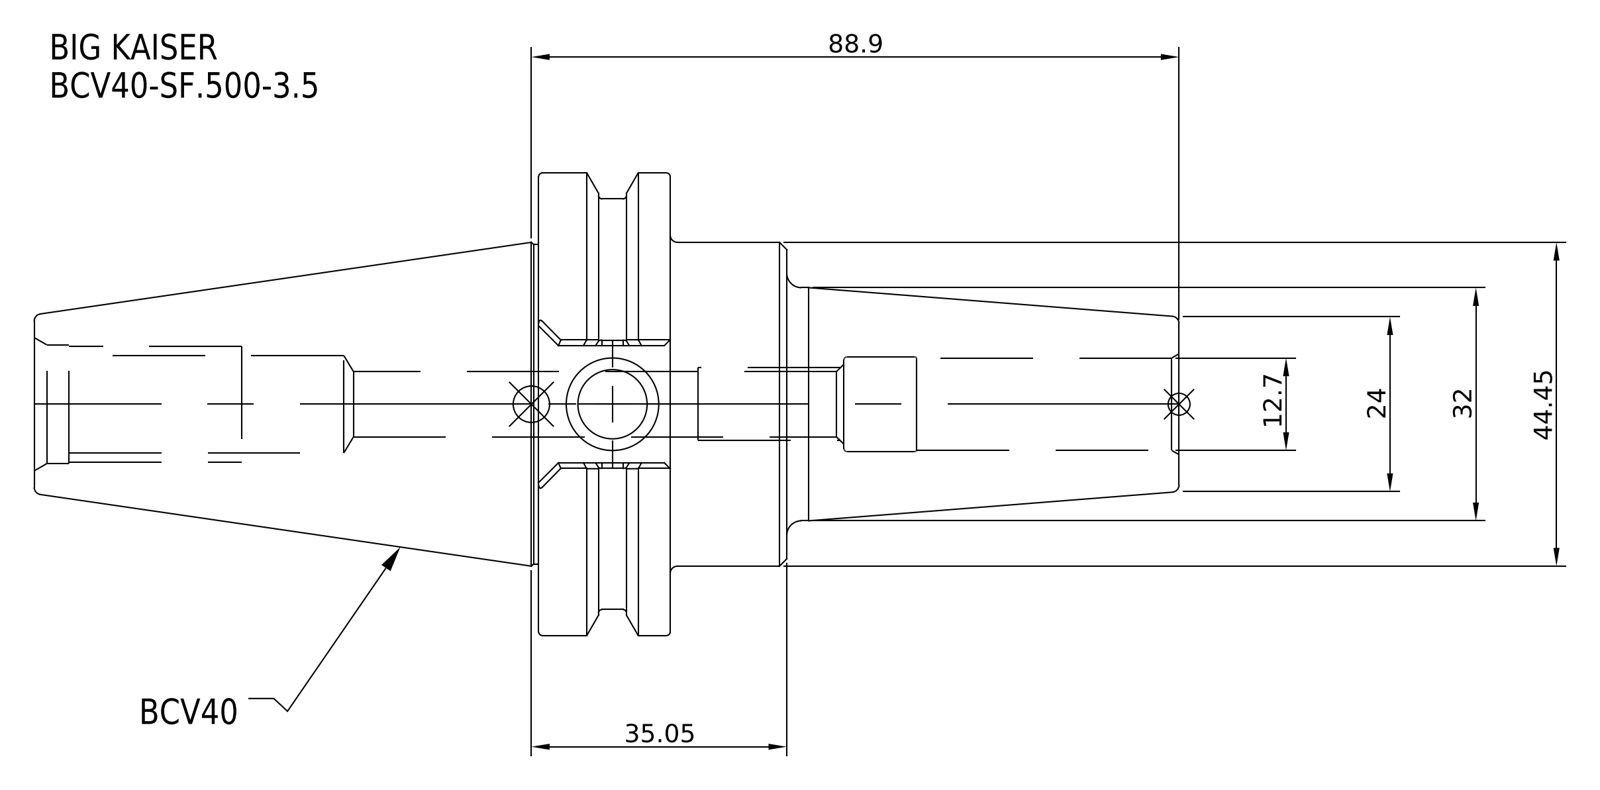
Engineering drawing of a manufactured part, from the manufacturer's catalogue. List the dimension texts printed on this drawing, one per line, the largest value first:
88.9
44.45
35.05
32
24
12.7
